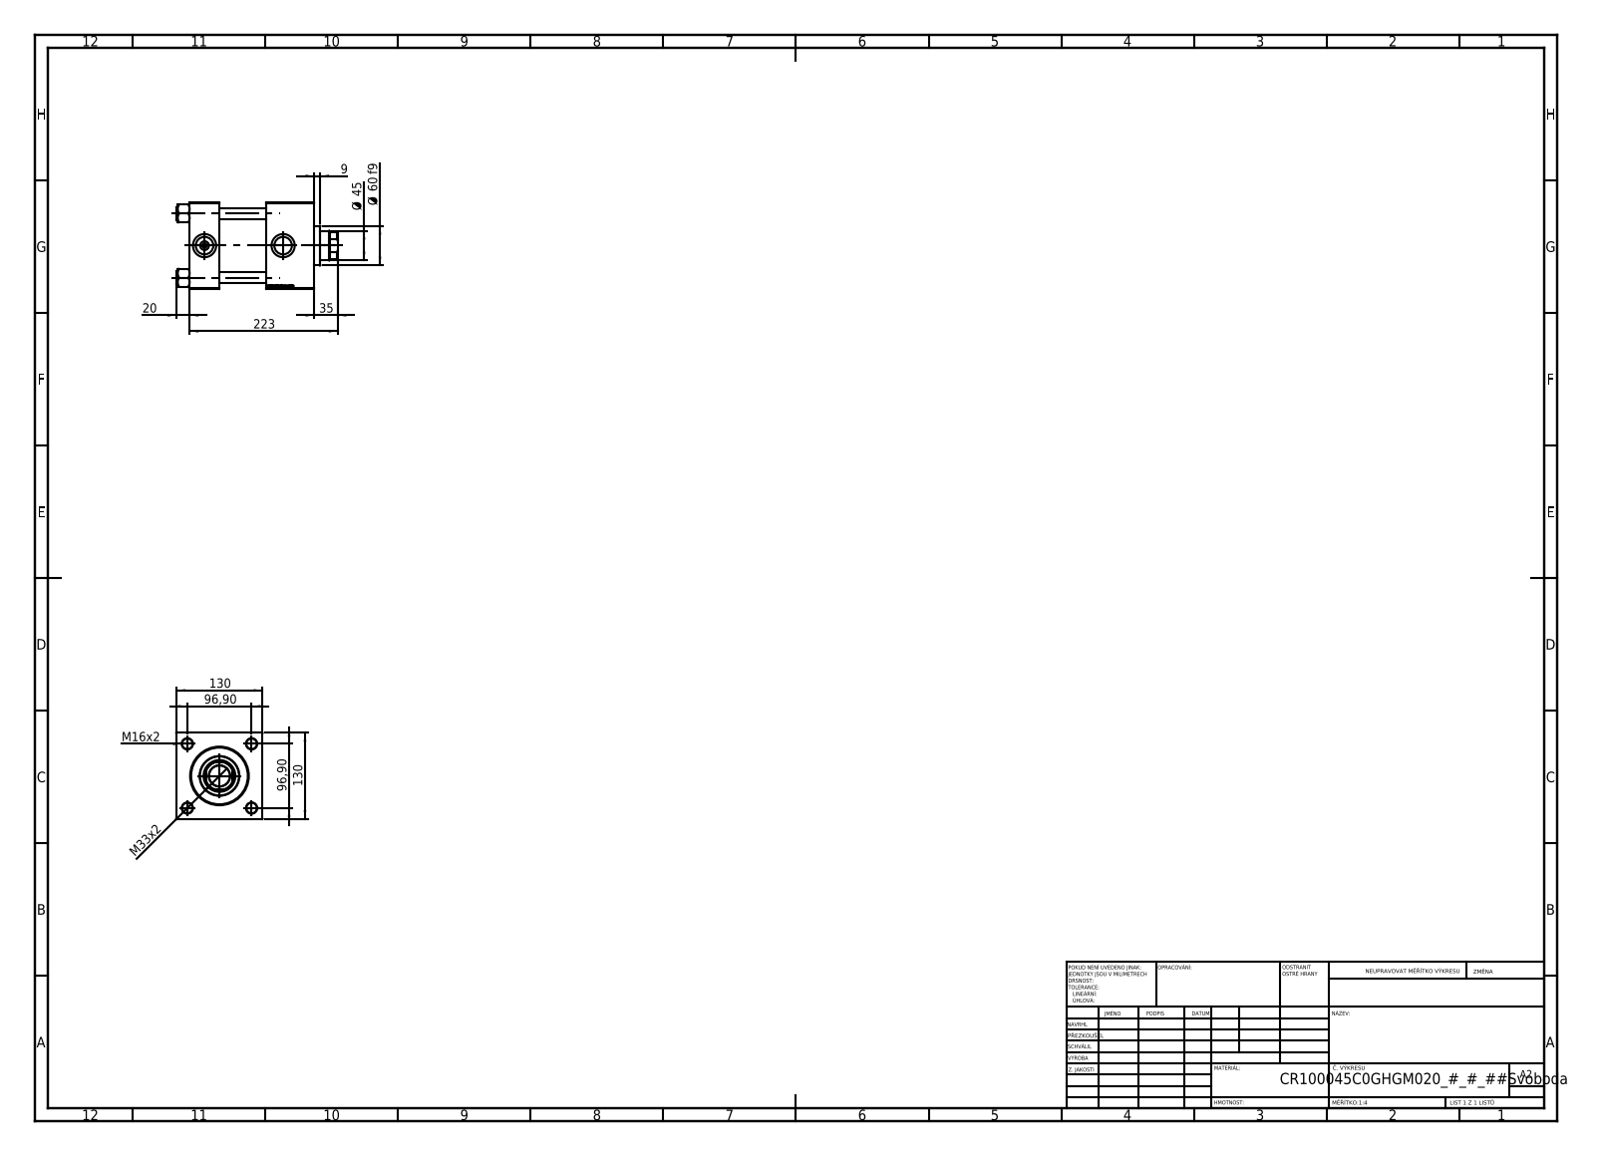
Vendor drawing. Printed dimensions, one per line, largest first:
223
130
130
96,90
96,90
Ø 60 f9
Ø 45
35
M33x2
20
M16x2
9
